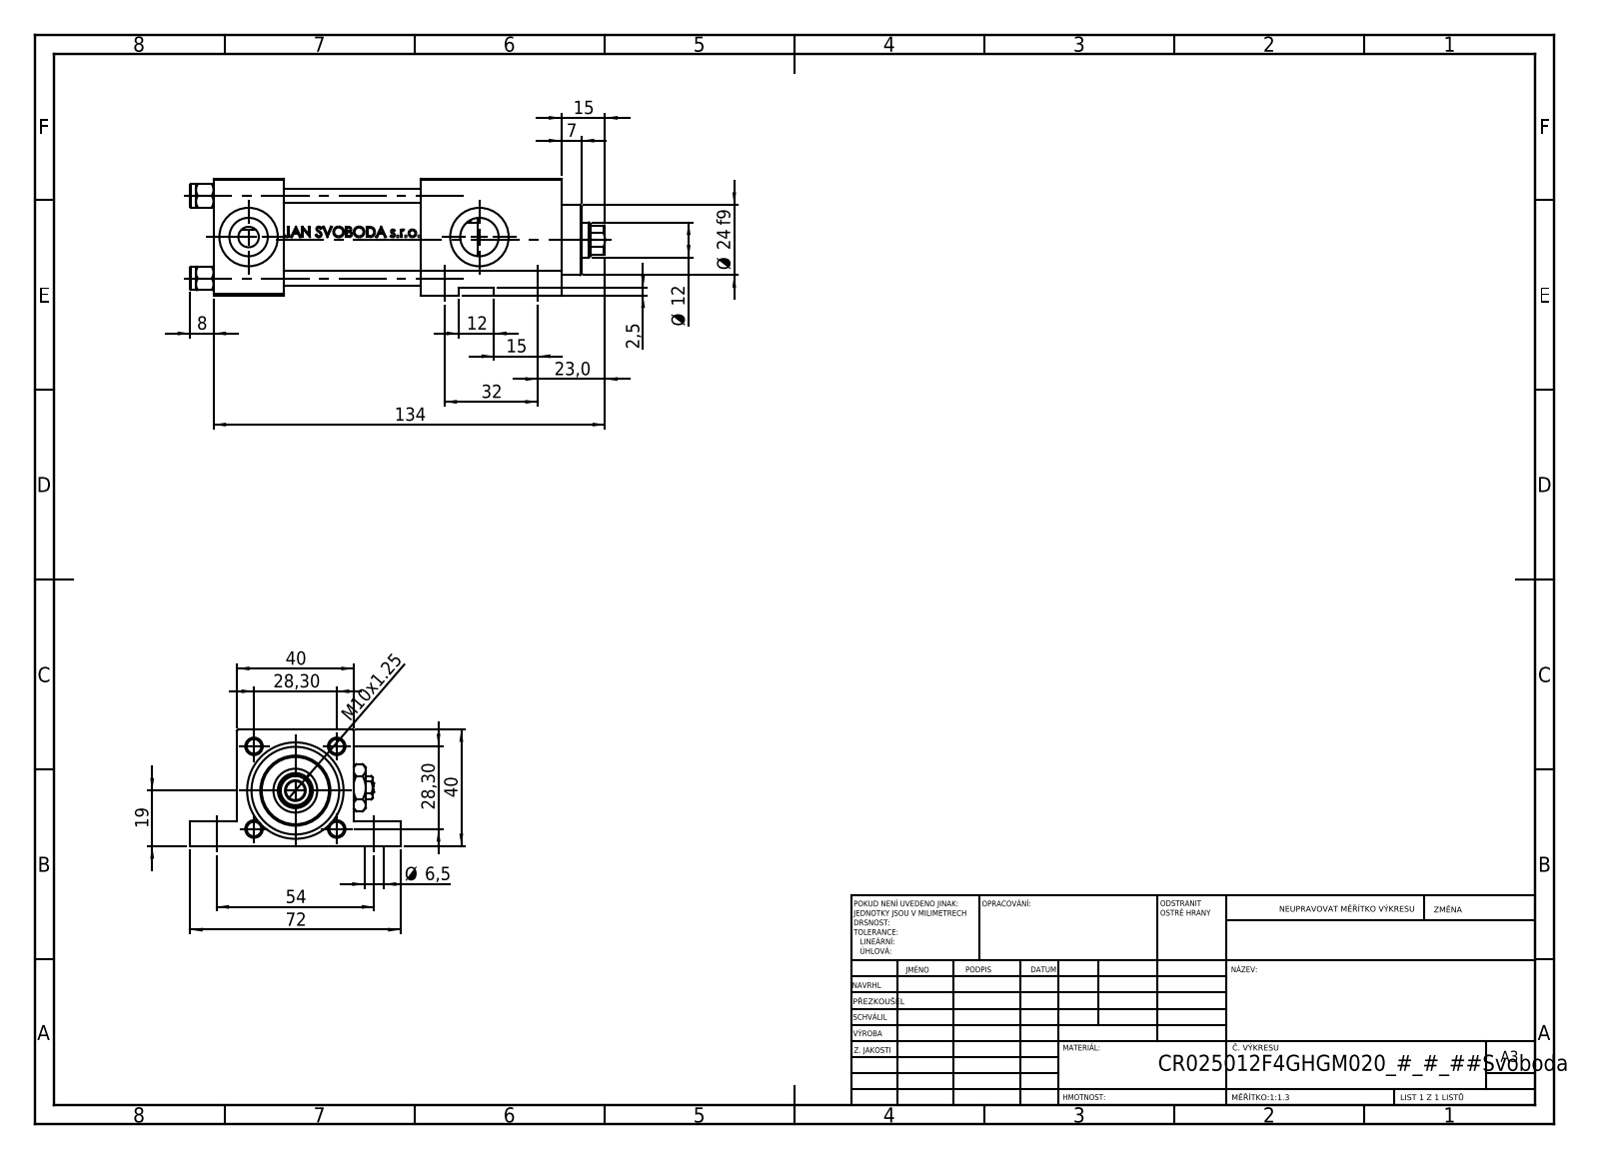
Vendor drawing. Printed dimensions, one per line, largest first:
134
72
54
40
40
32
28,30
28,30
Ø 24 f9
23,0
19
15
15
12
Ø 12
M10x1.25
8
7
Ø 6,5
2,5
